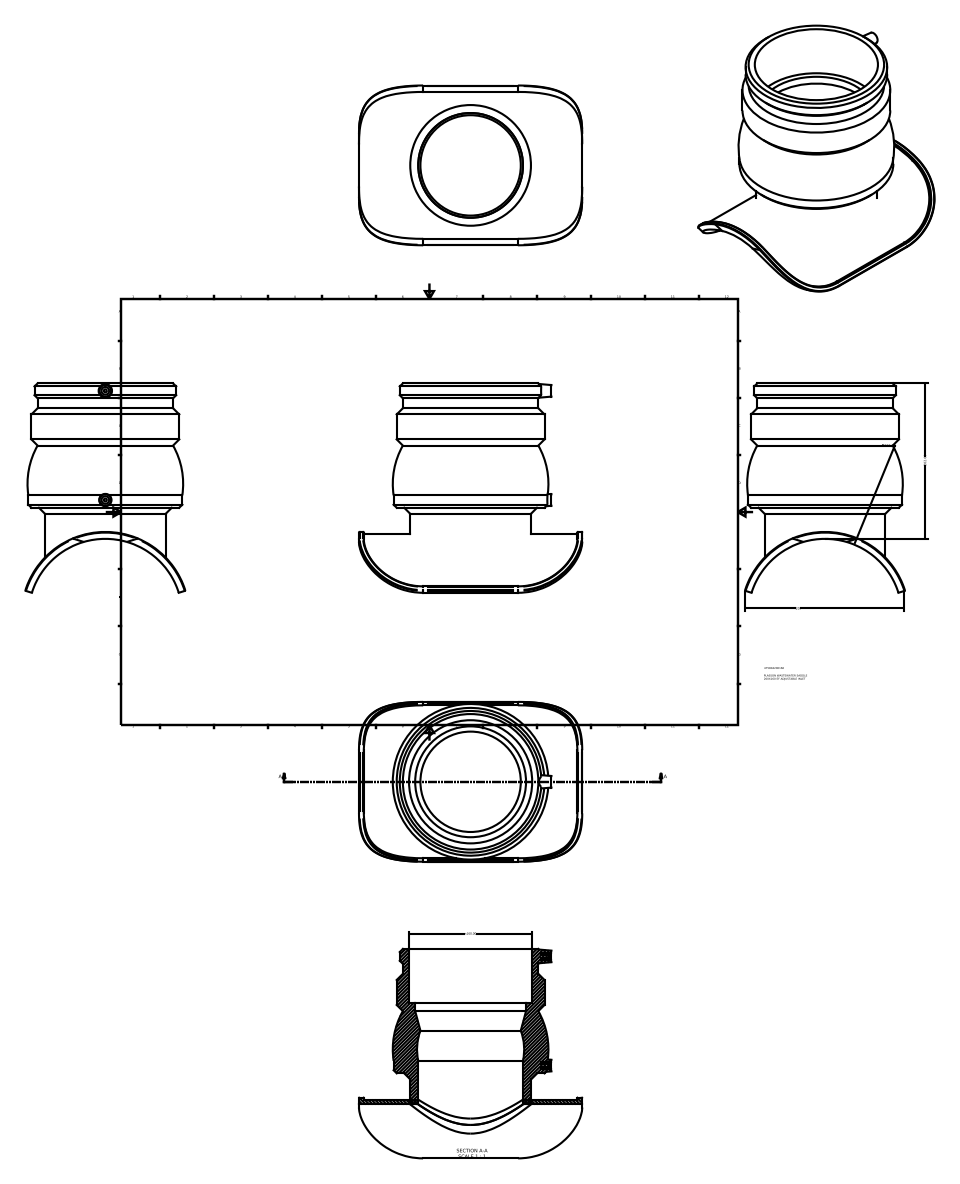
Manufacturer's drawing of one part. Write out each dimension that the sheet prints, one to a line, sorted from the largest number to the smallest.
207
202.00
∅200.0
n160.00
